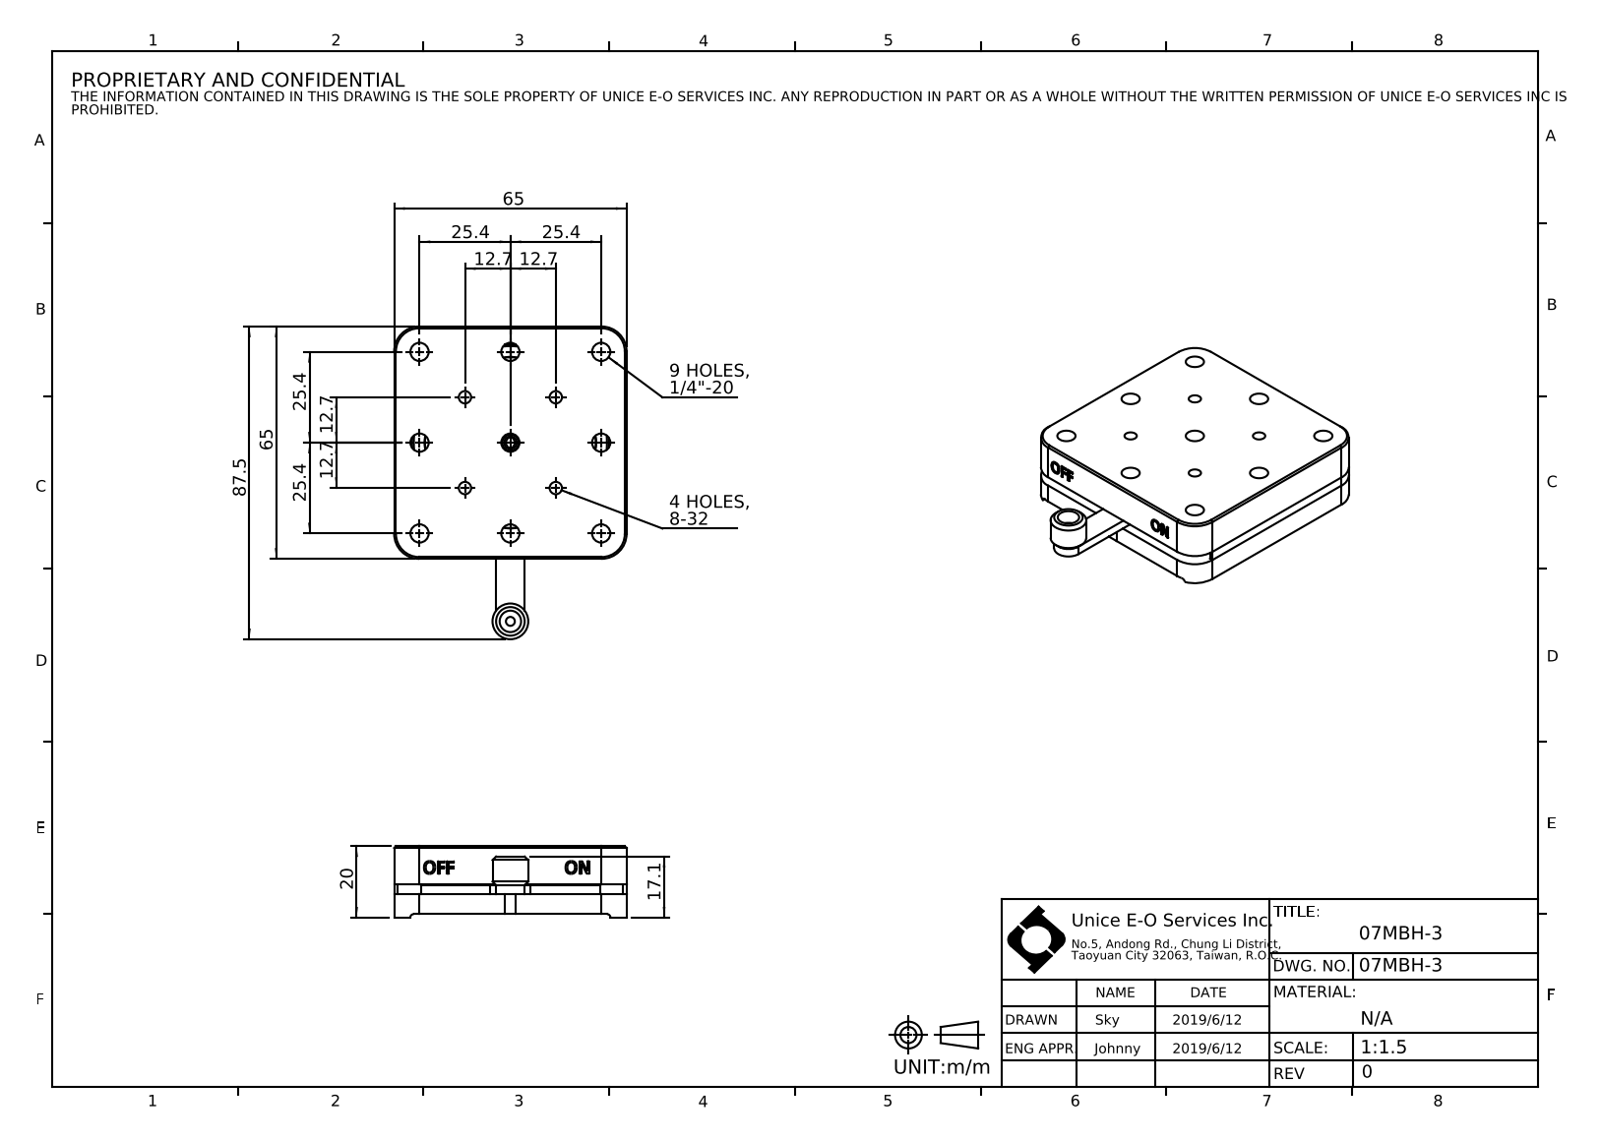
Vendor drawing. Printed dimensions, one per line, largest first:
87.5
65
65
25.4
25.4
25.4
25.4
20
17.1
12.7
12.7
12.7
12.7
